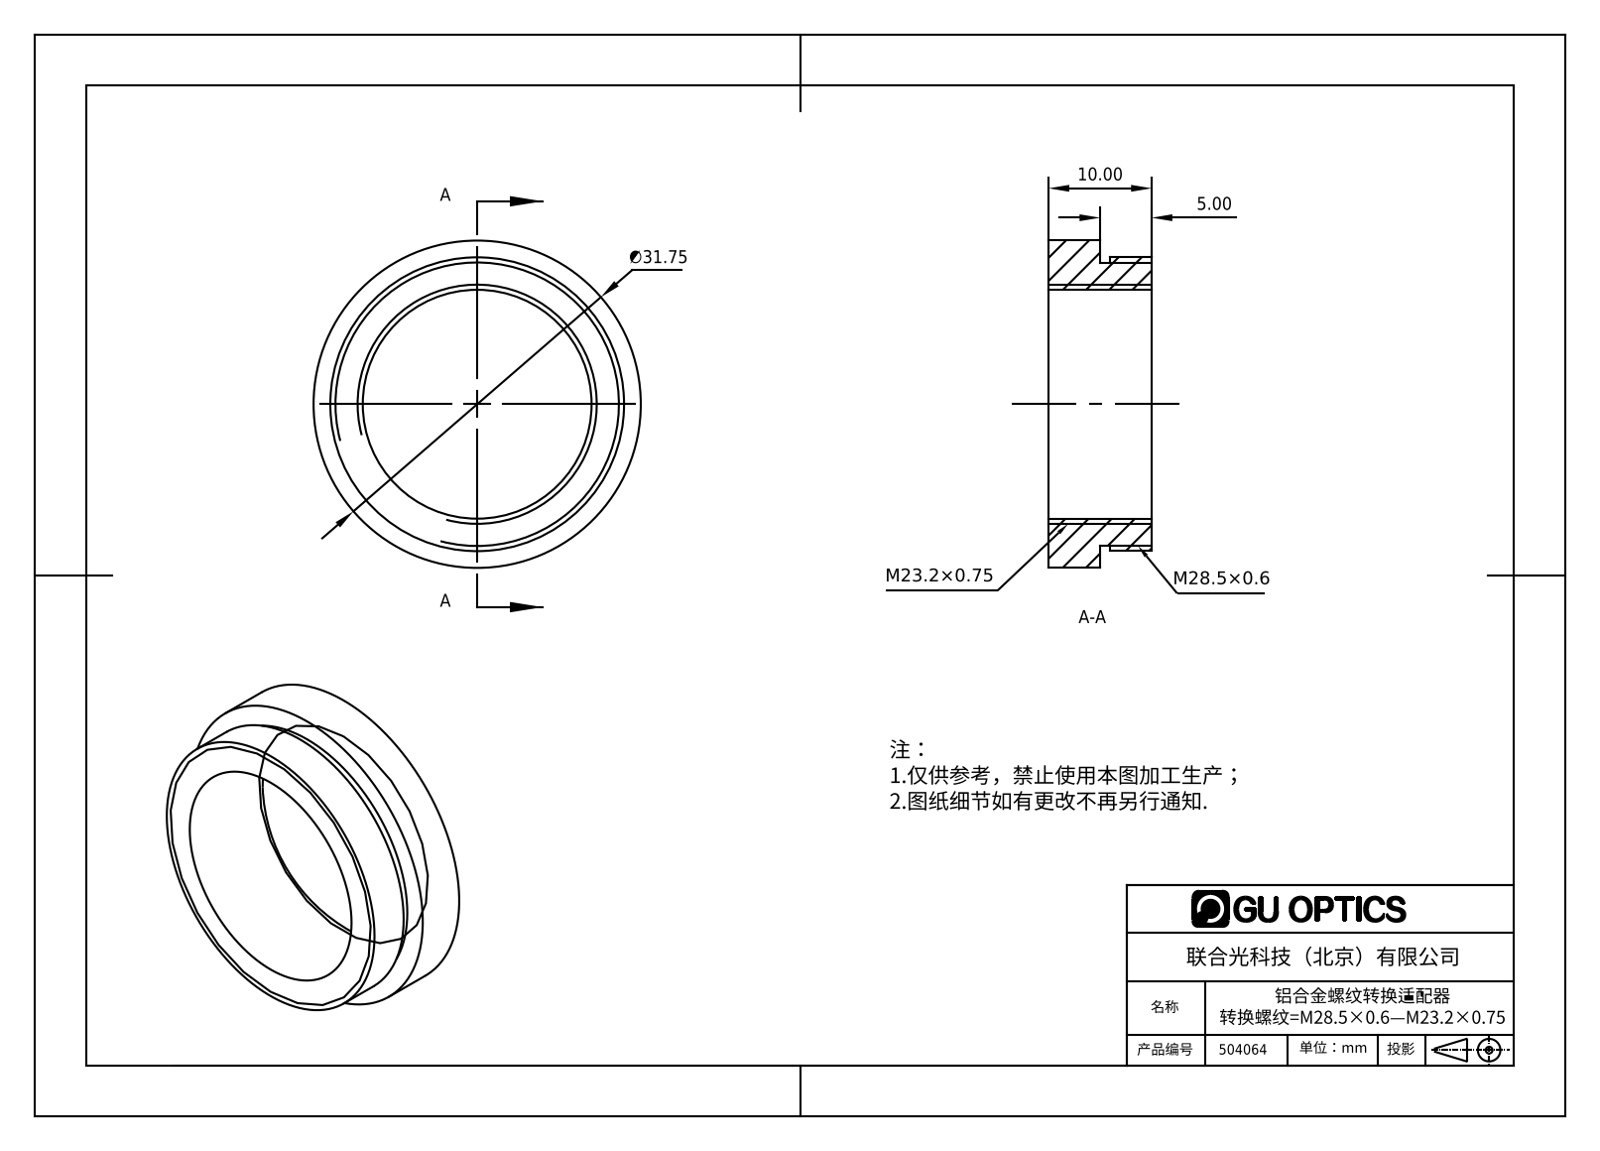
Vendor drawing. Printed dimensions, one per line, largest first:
∅31.75
10.00
5.00
